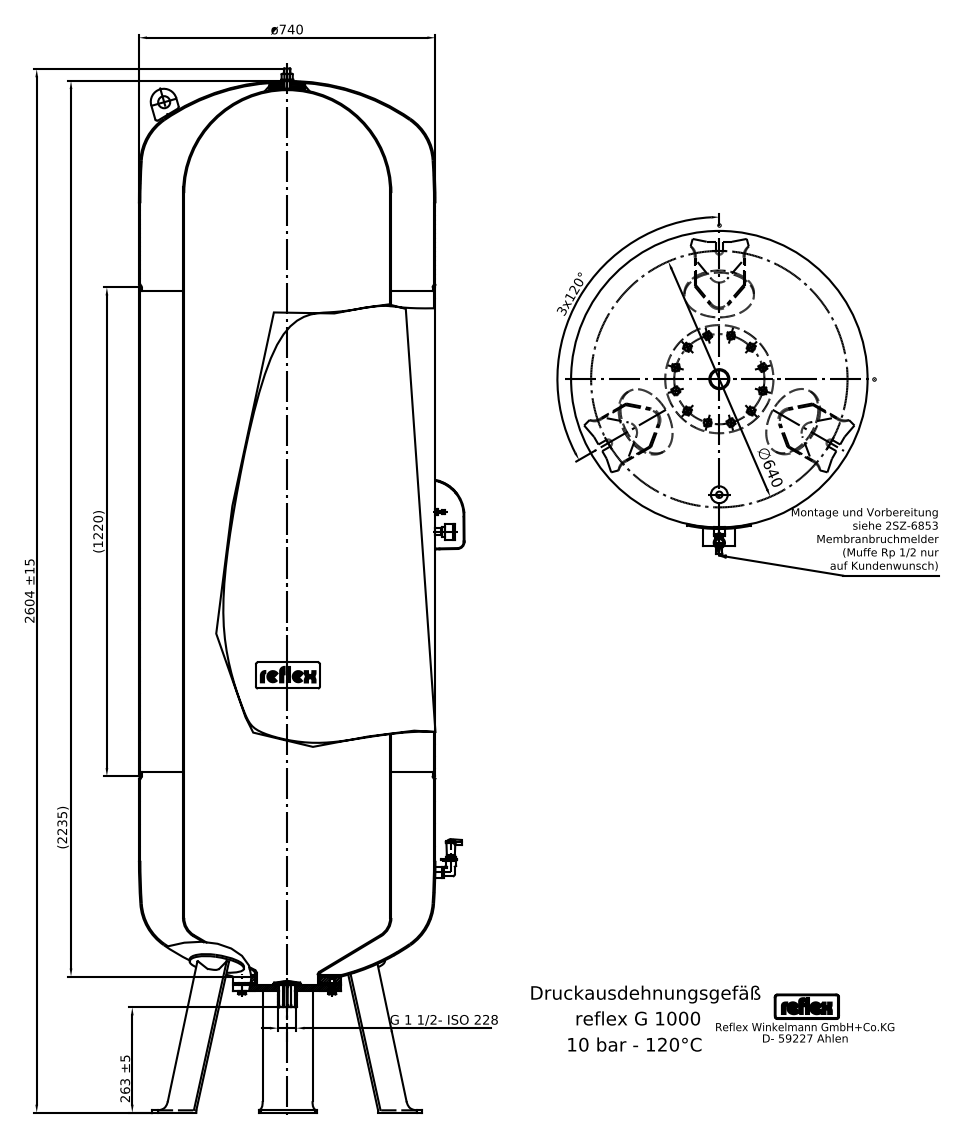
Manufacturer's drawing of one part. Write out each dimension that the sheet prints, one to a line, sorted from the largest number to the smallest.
2604 ±15
(2235)
(1220)
ø740
∅640
263 ±5
3x120°
G 1 1/2- ISO 228
